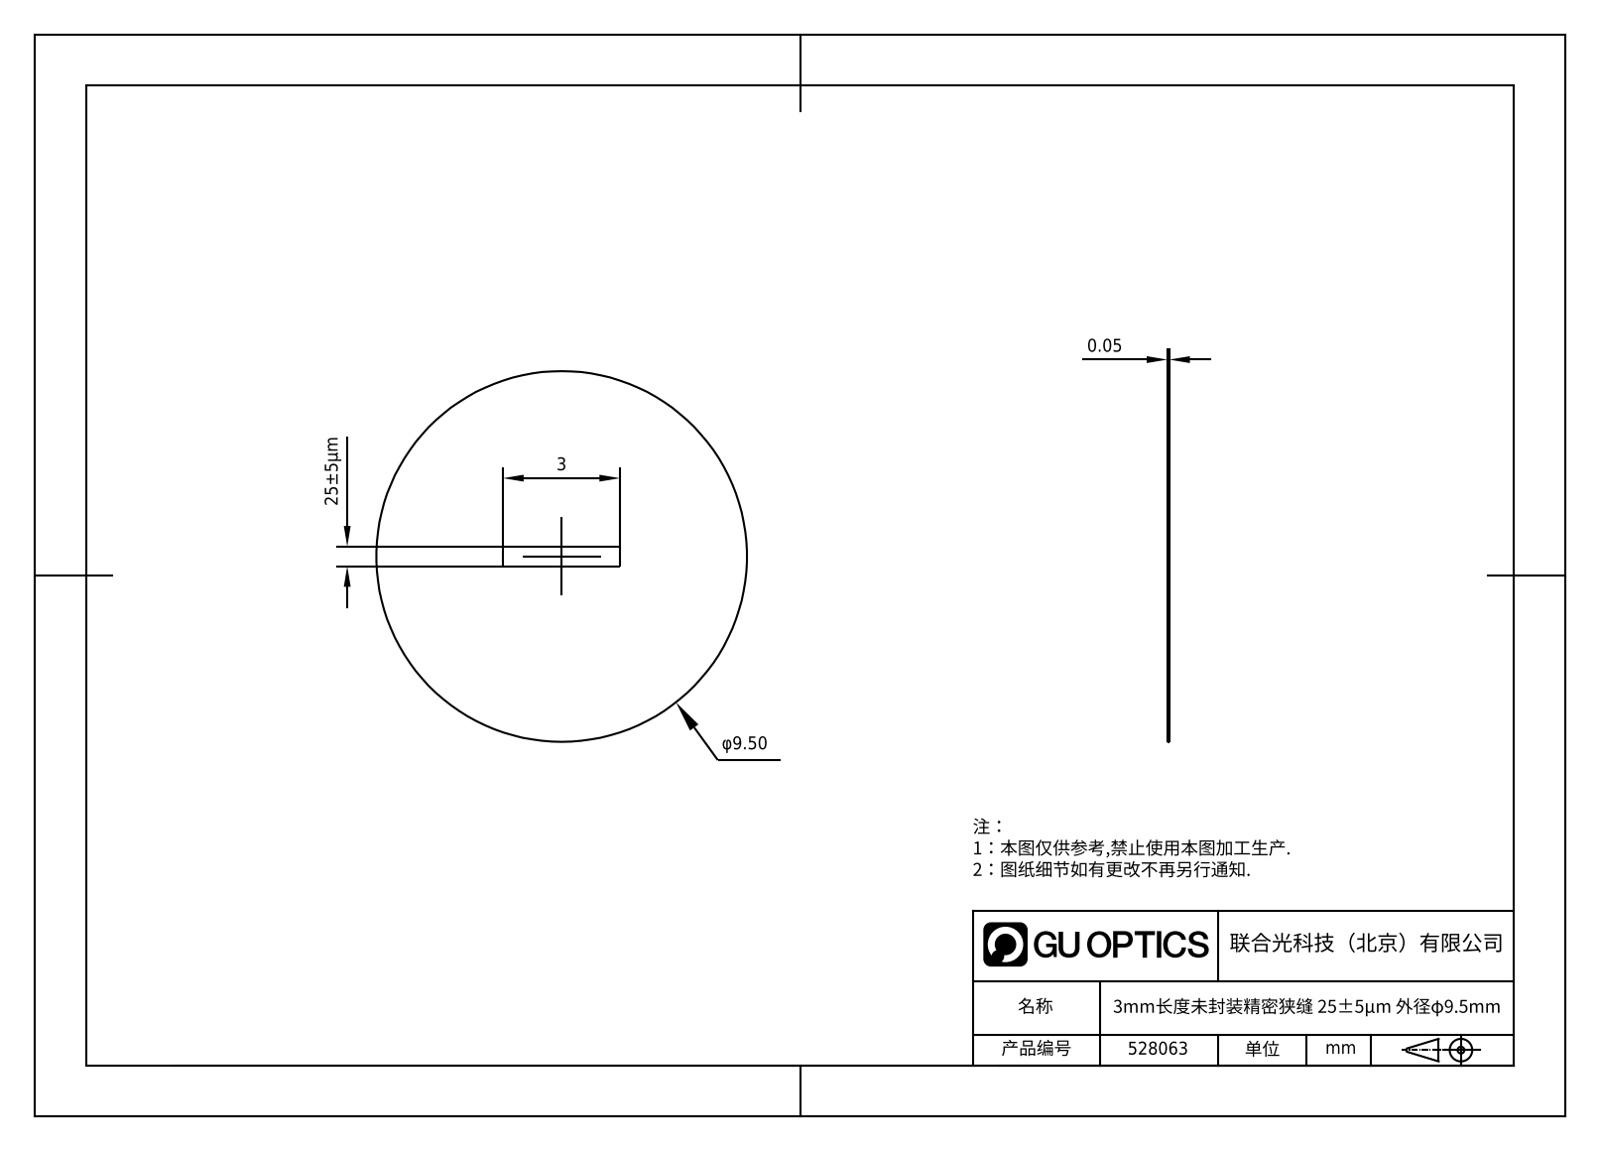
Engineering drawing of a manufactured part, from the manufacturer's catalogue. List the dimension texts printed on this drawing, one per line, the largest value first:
25±5μm
3
0.05
